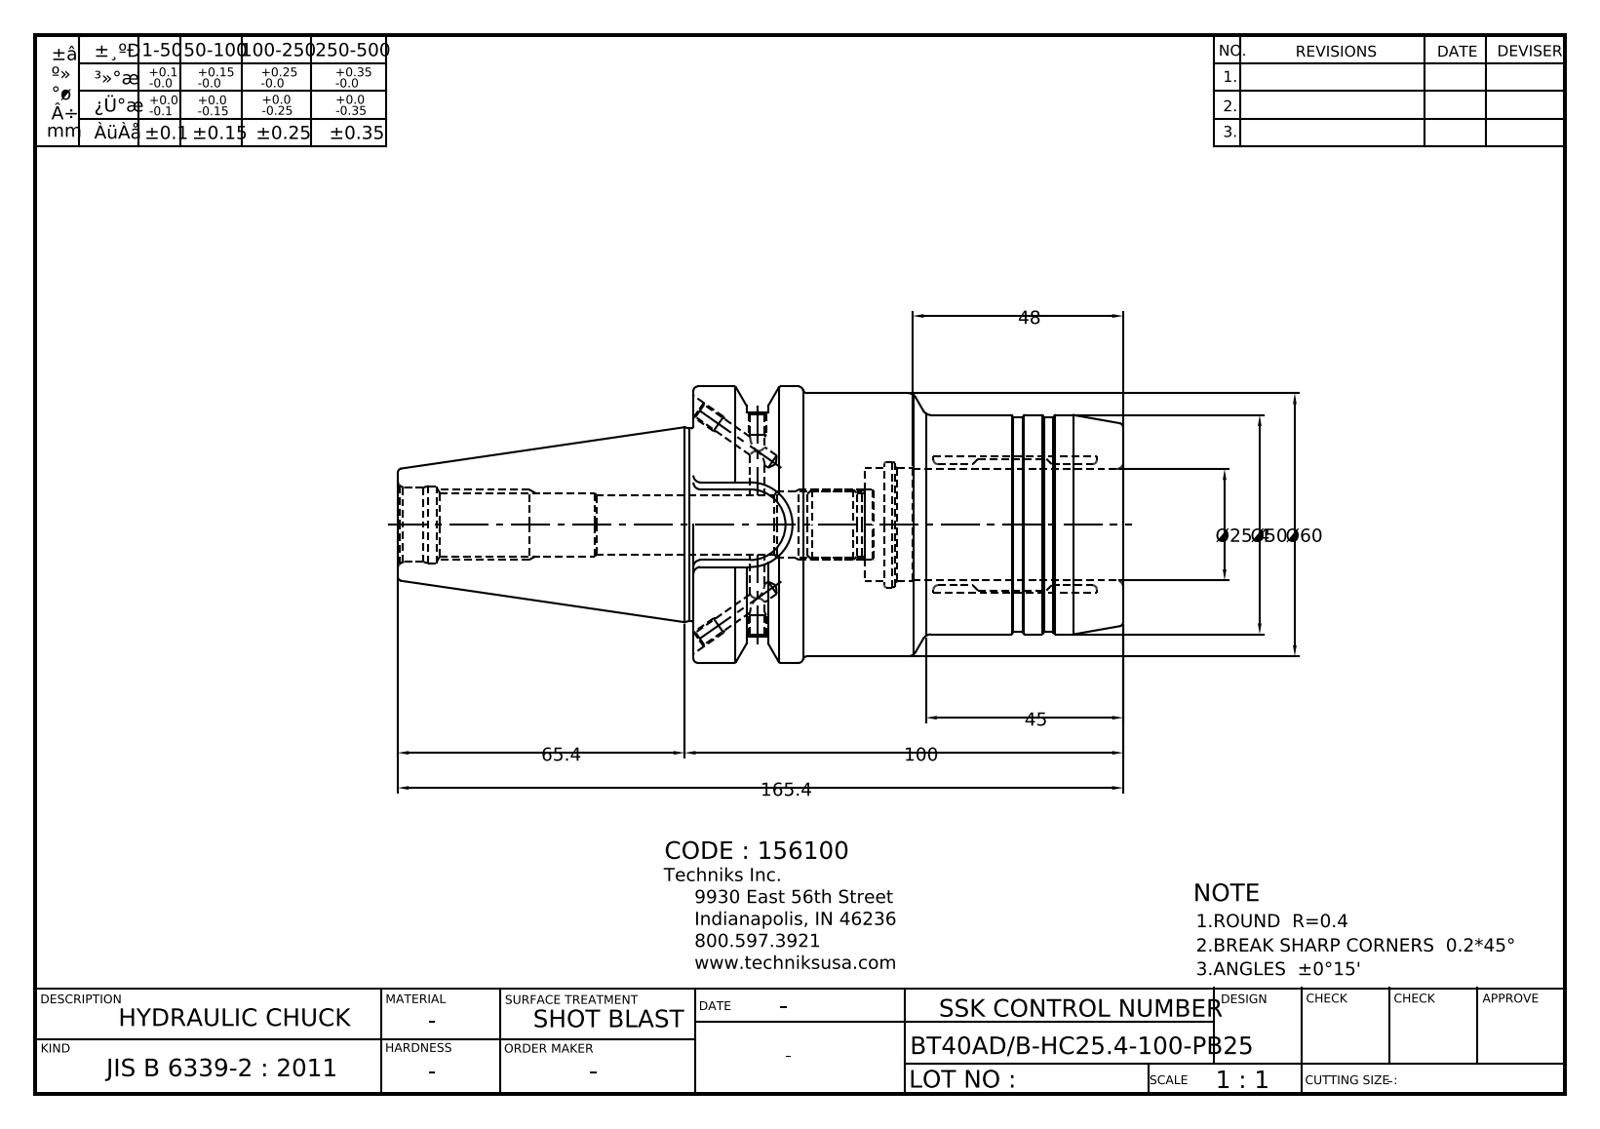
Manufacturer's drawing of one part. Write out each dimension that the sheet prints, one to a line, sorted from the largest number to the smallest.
165.4
100
65.4
Ø60
Ø50
48
45
Ø25.4
